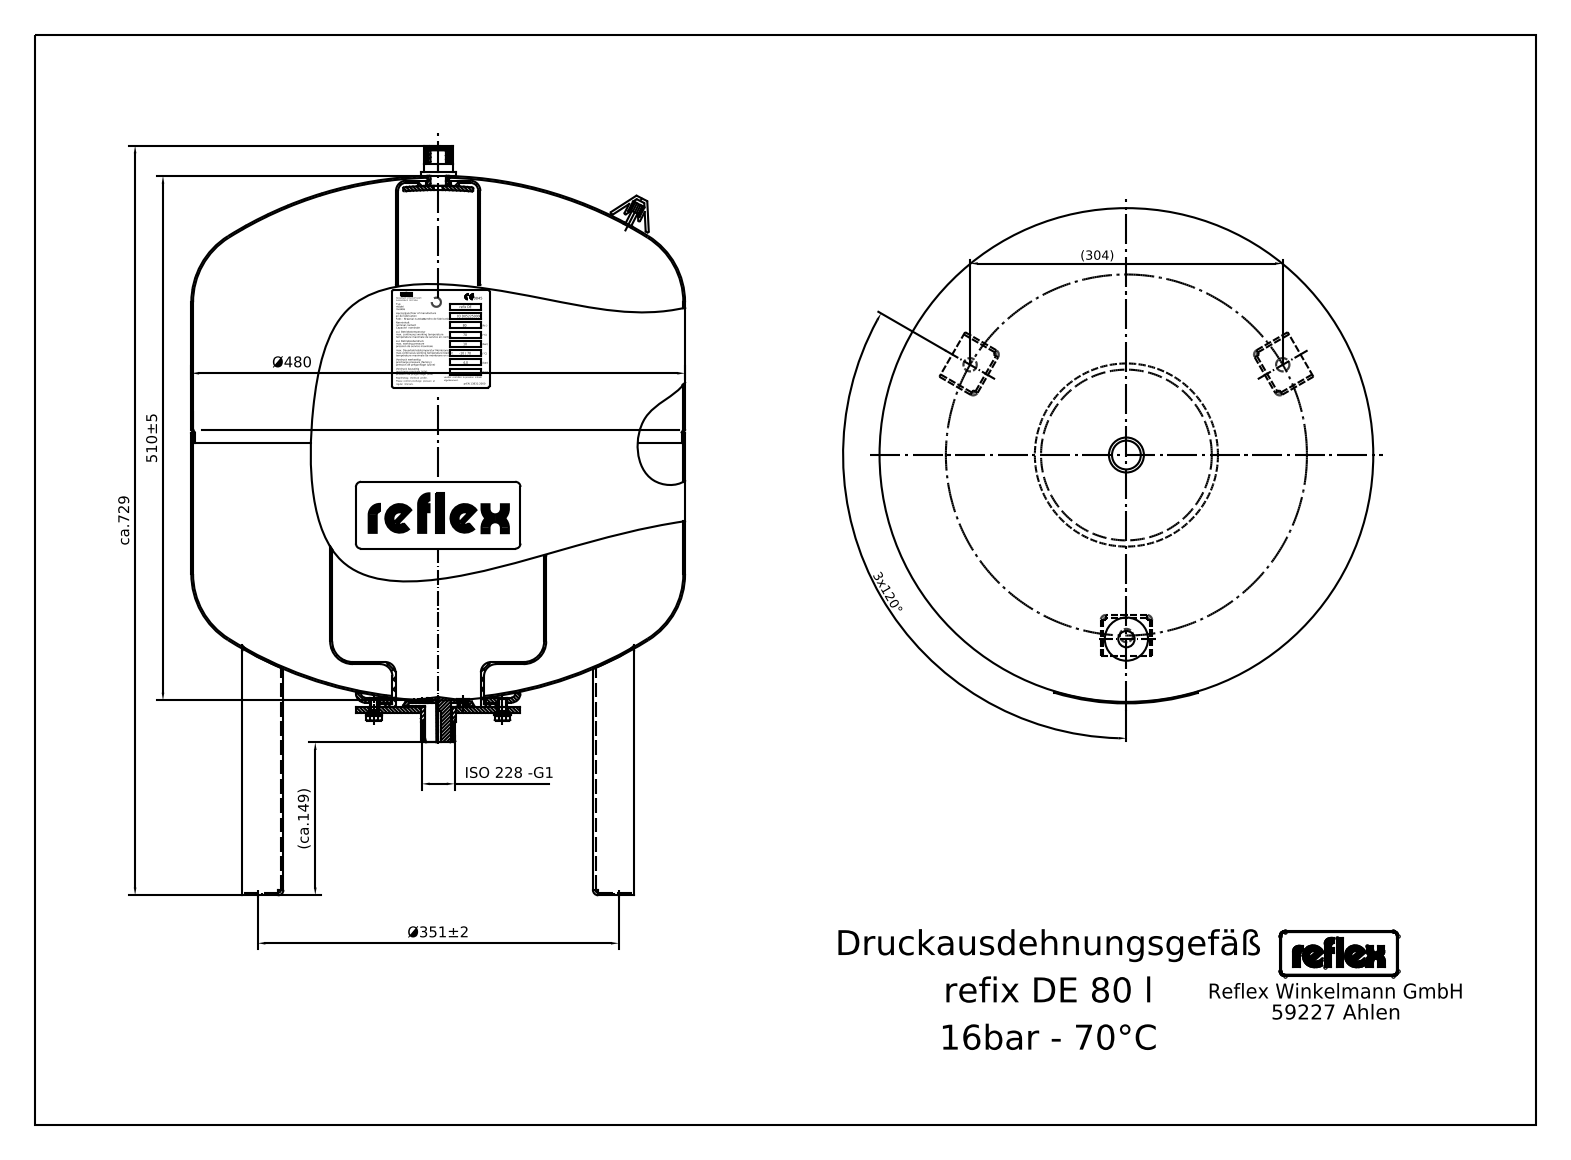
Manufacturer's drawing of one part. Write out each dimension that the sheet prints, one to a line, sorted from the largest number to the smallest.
510±5
Ø480
Ø351±2
(304)
ISO 228 -G1
3x120°
ca.729
(ca.149)
